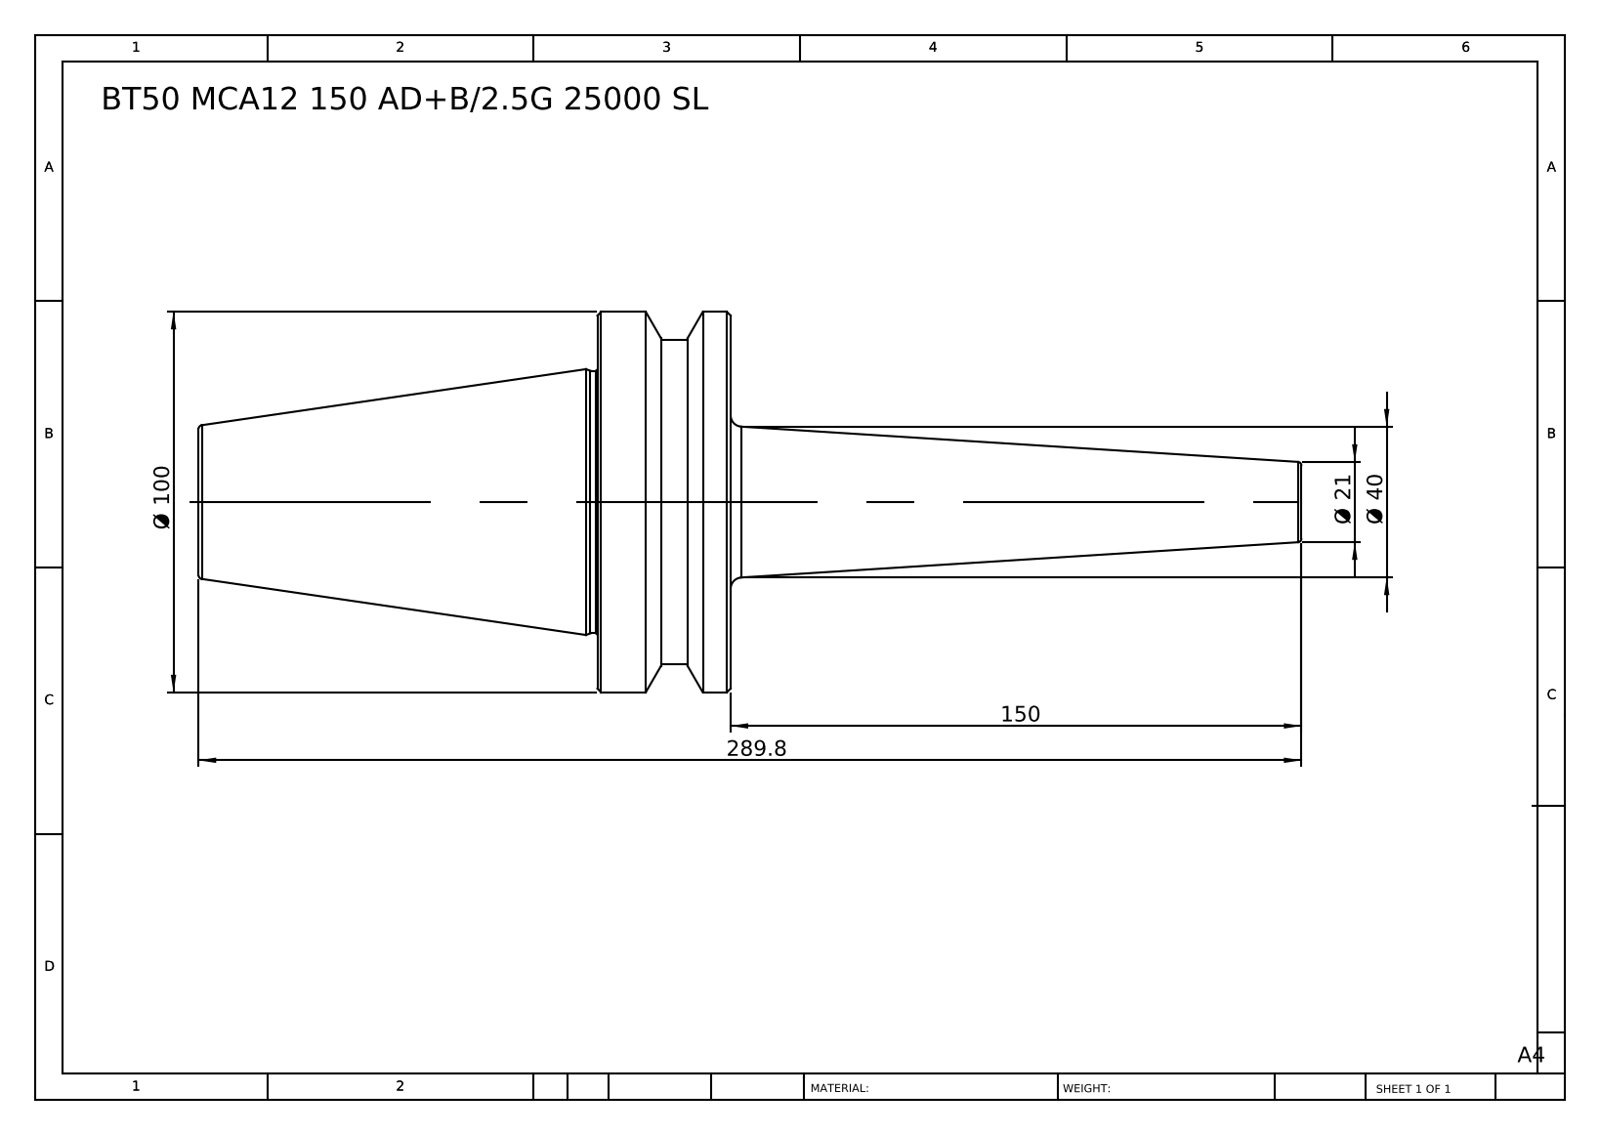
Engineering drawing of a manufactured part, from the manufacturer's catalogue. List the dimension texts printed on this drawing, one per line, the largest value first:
289.8
150
Ø 100
Ø 40
Ø 21
